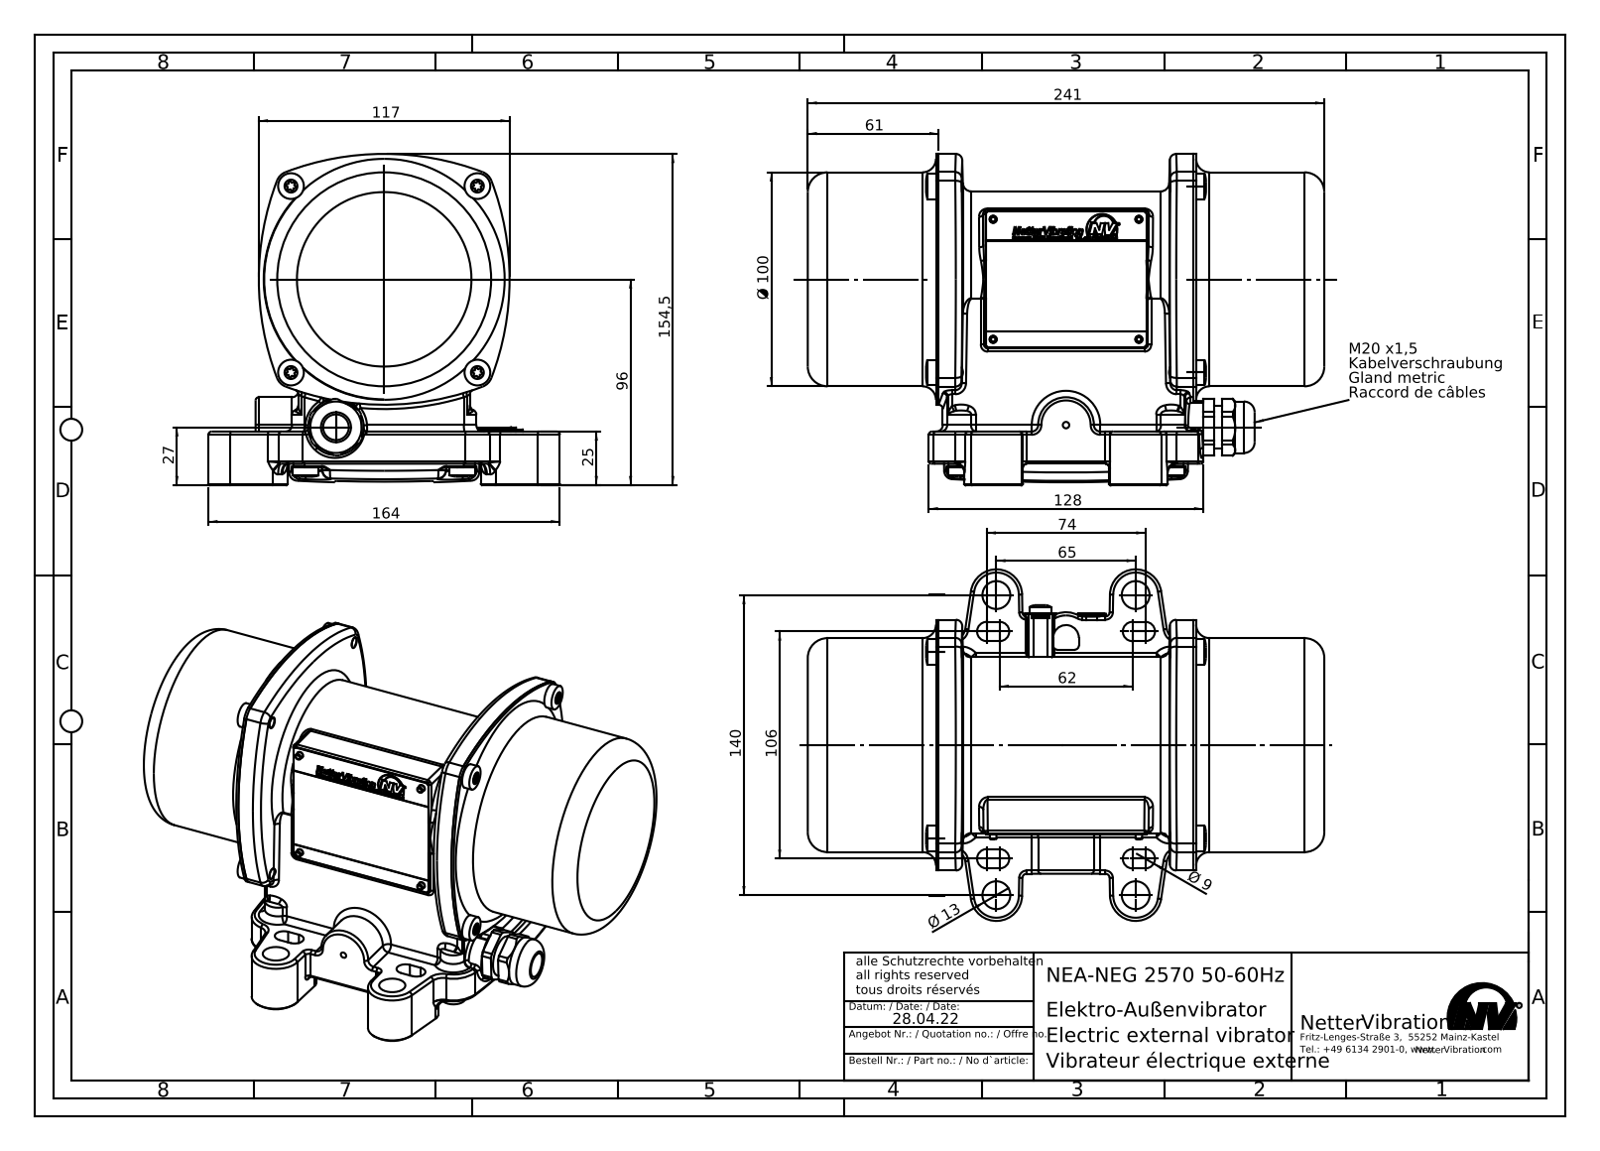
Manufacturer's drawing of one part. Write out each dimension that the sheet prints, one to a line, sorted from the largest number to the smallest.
241
164
154,5
140
128
117
106
Ø 100
96
74
65
62
61
27
25
Ø 13
Ø 9
